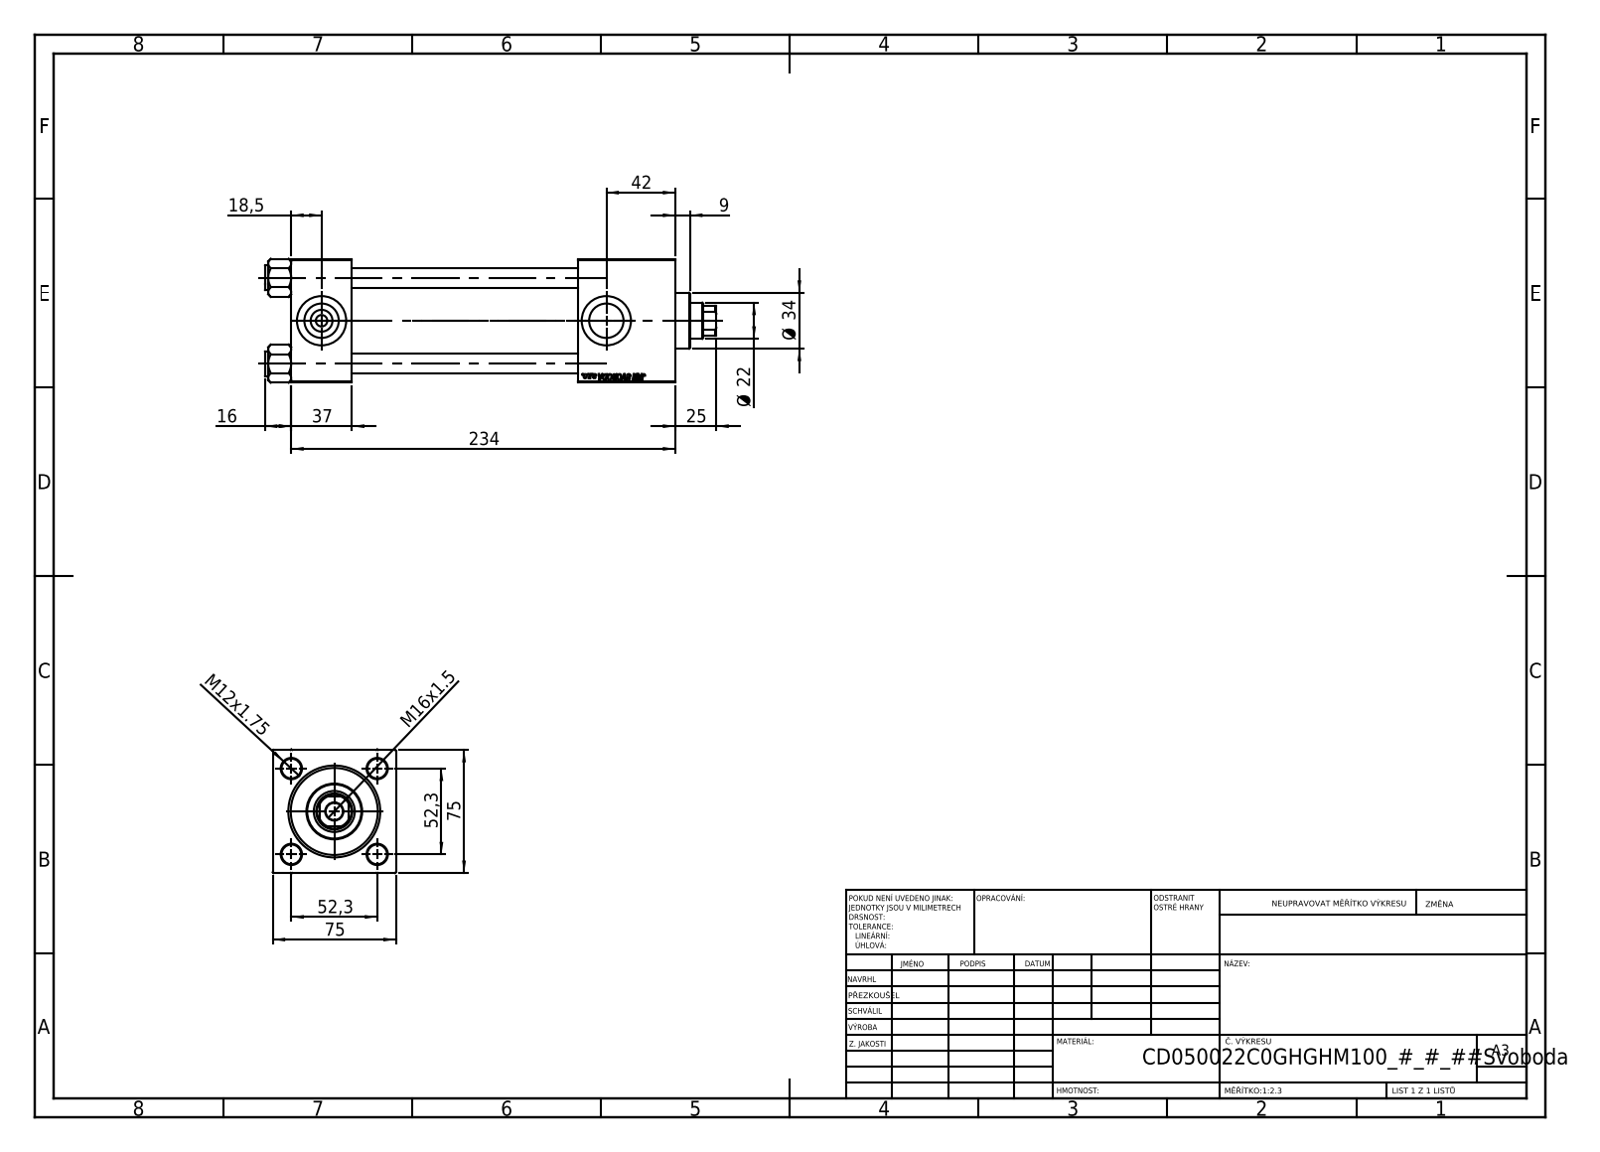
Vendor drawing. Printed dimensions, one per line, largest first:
234
75
75
52,3
52,3
42
37
Ø 34
25
Ø 22
18,5
16
M16x1.5
M12x1.75
9
